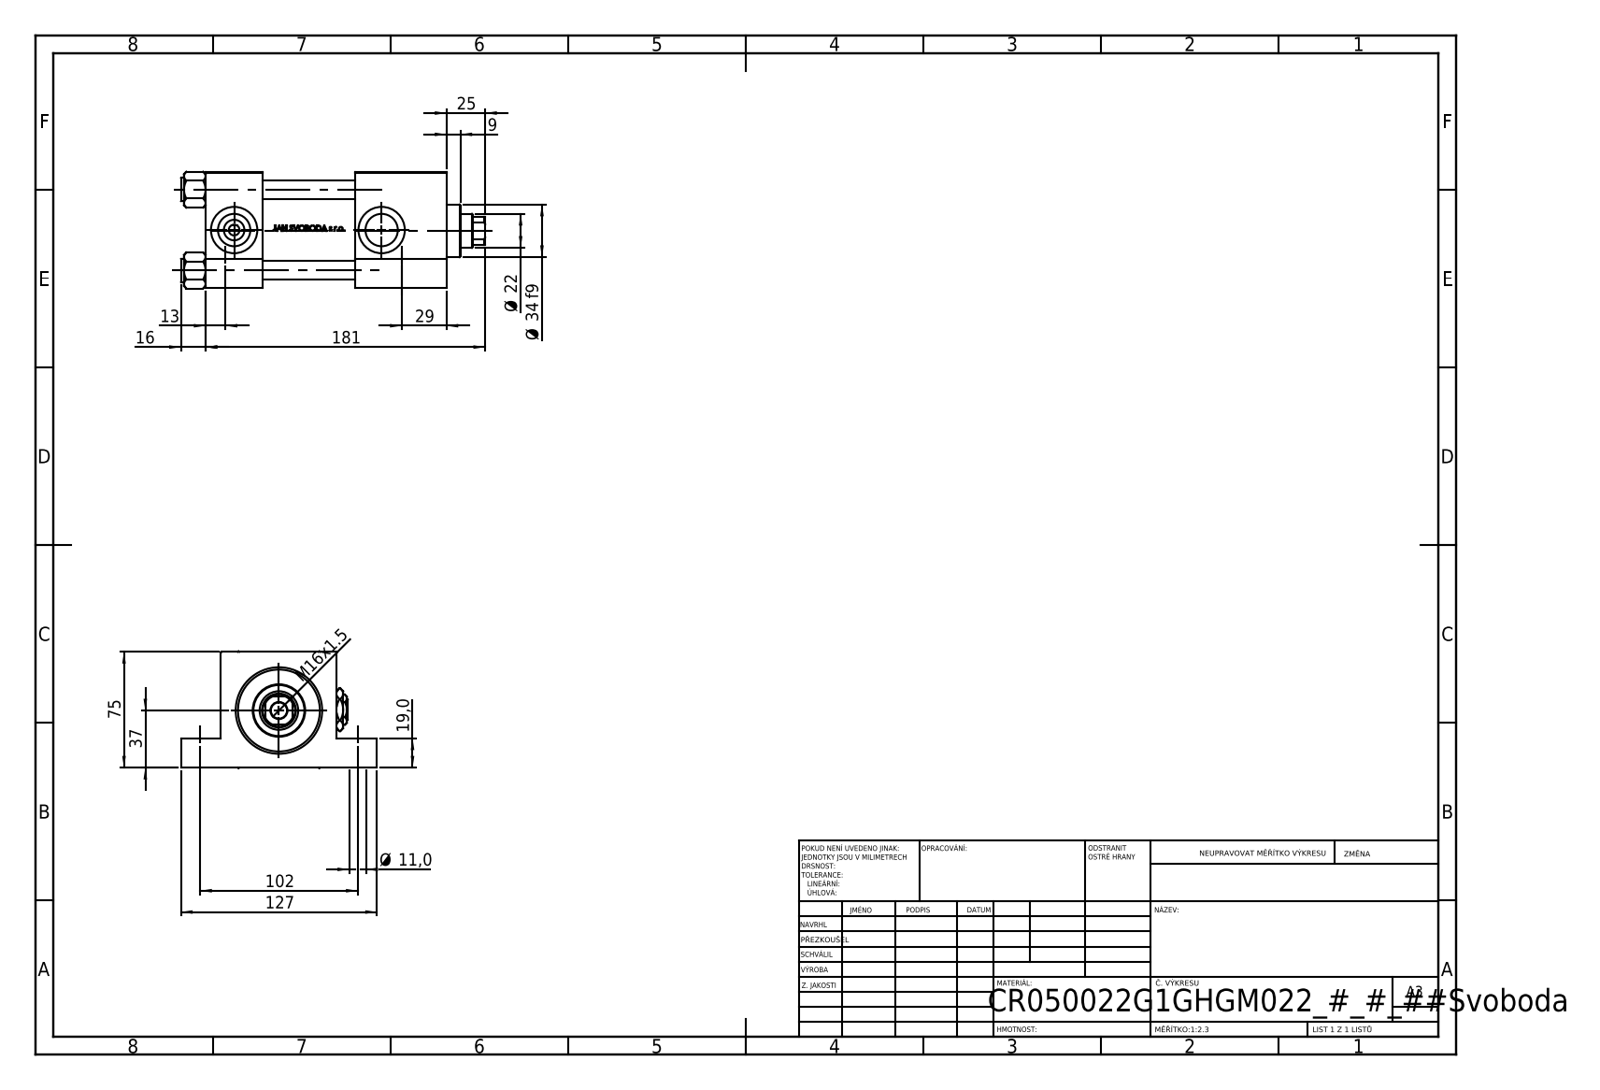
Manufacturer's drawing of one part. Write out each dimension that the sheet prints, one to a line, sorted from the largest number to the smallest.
181
127
102
75
37
Ø 34 f9
29
25
Ø 22
19,0
16
M16x1.5
13
Ø 11,0
9
